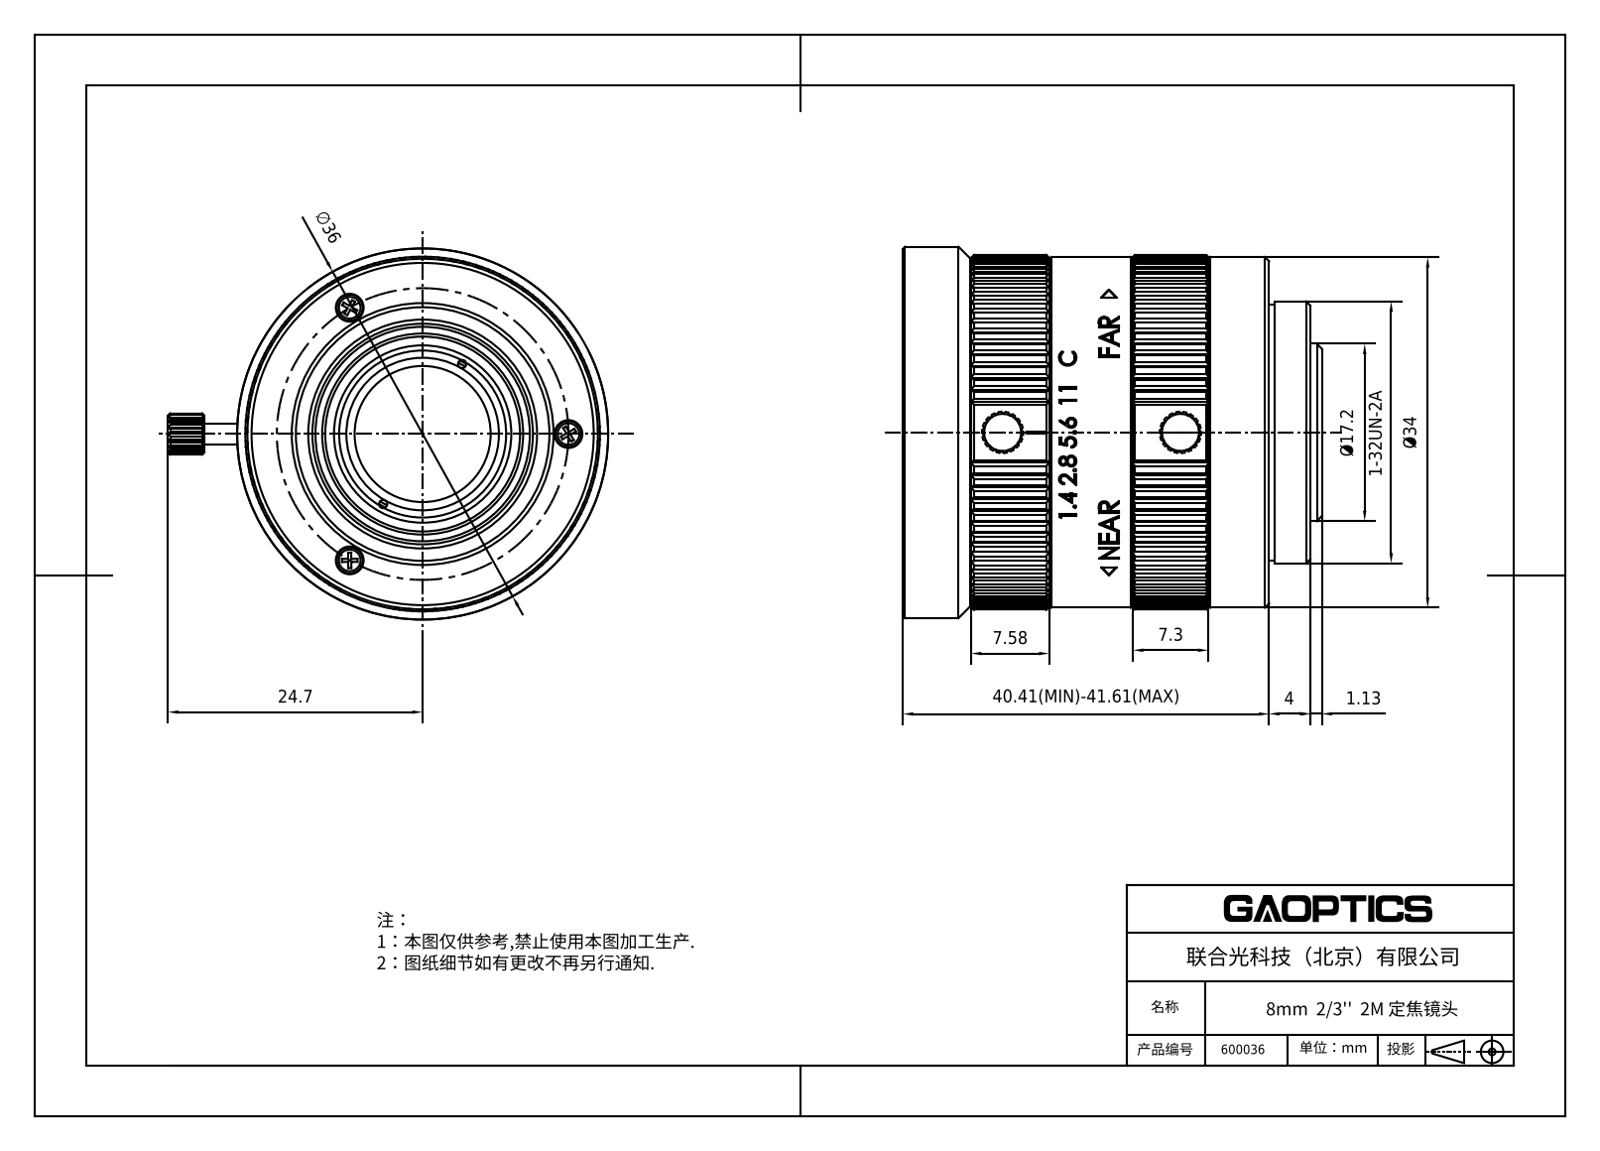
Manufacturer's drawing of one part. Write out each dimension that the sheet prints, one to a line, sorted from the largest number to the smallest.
40.41(MIN)-41.61(MAX)
∅36
Ø34
24.7
Ø17.2
7.58
7.3
4
1.13
1-32UN-2A
